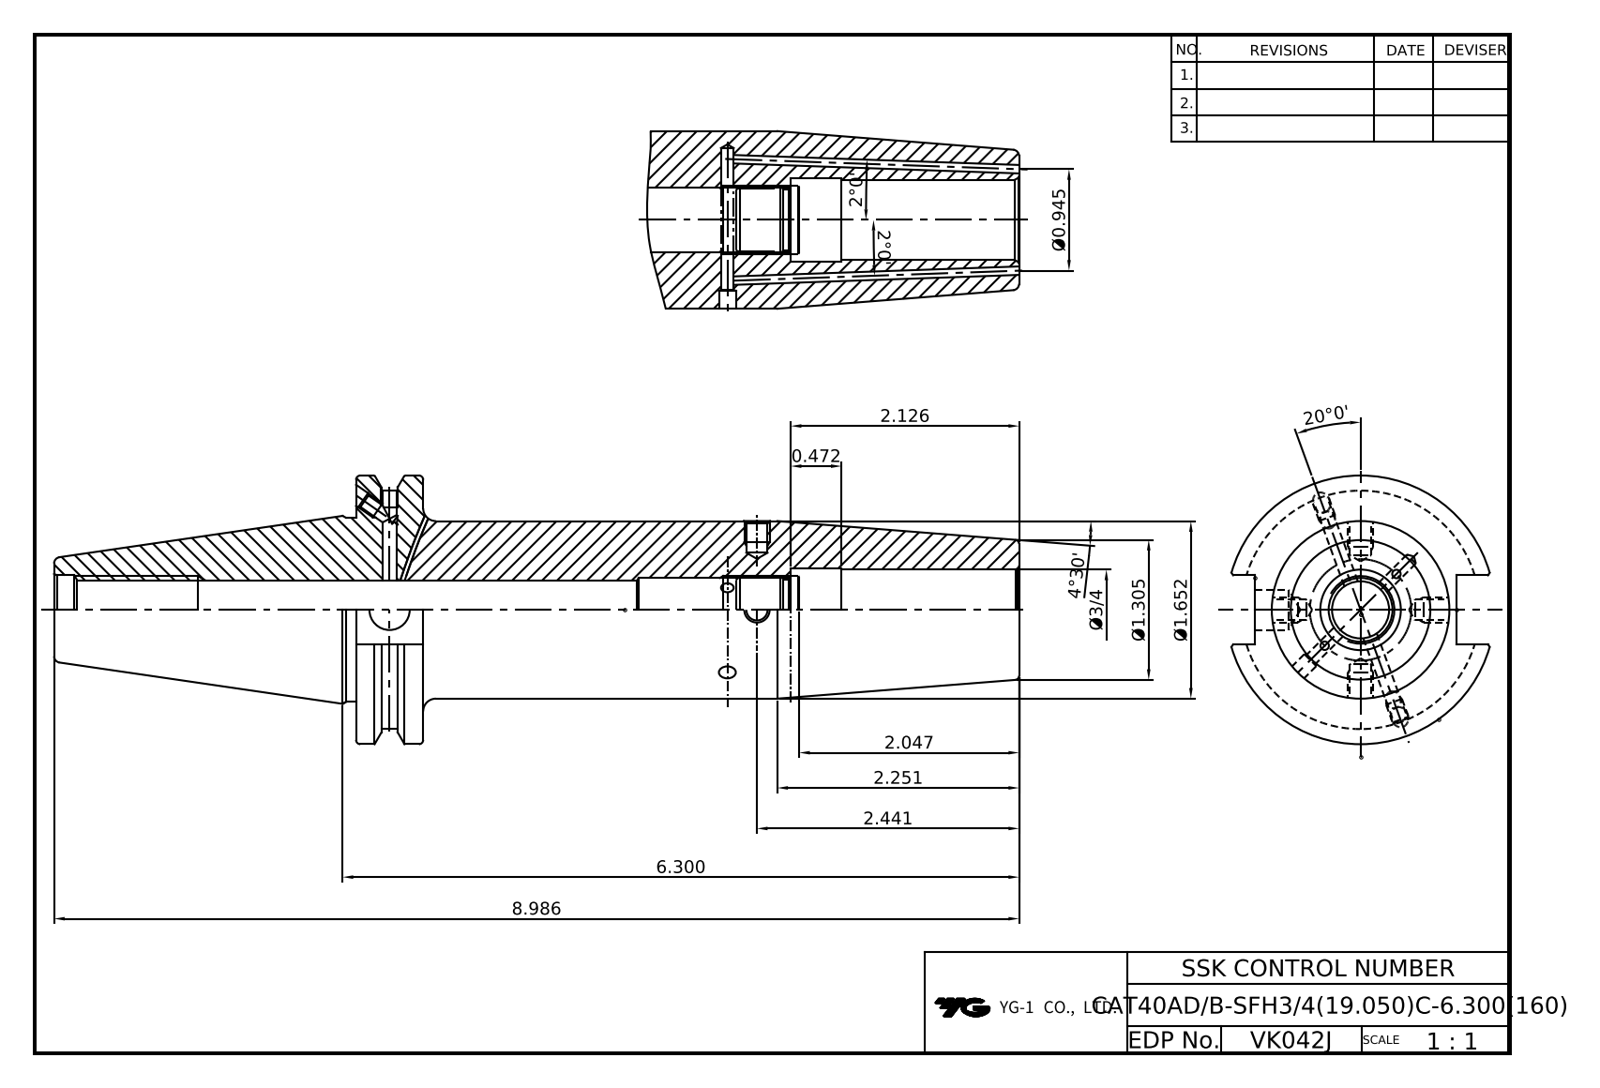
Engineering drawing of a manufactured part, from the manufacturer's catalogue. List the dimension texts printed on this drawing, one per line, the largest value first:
20°0'
8.986
6.300
4°30'
2.441
2.251
2.126
2.047
2°0'
2°0'
Ø1.652
Ø1.305
Ø0.945
0.472
